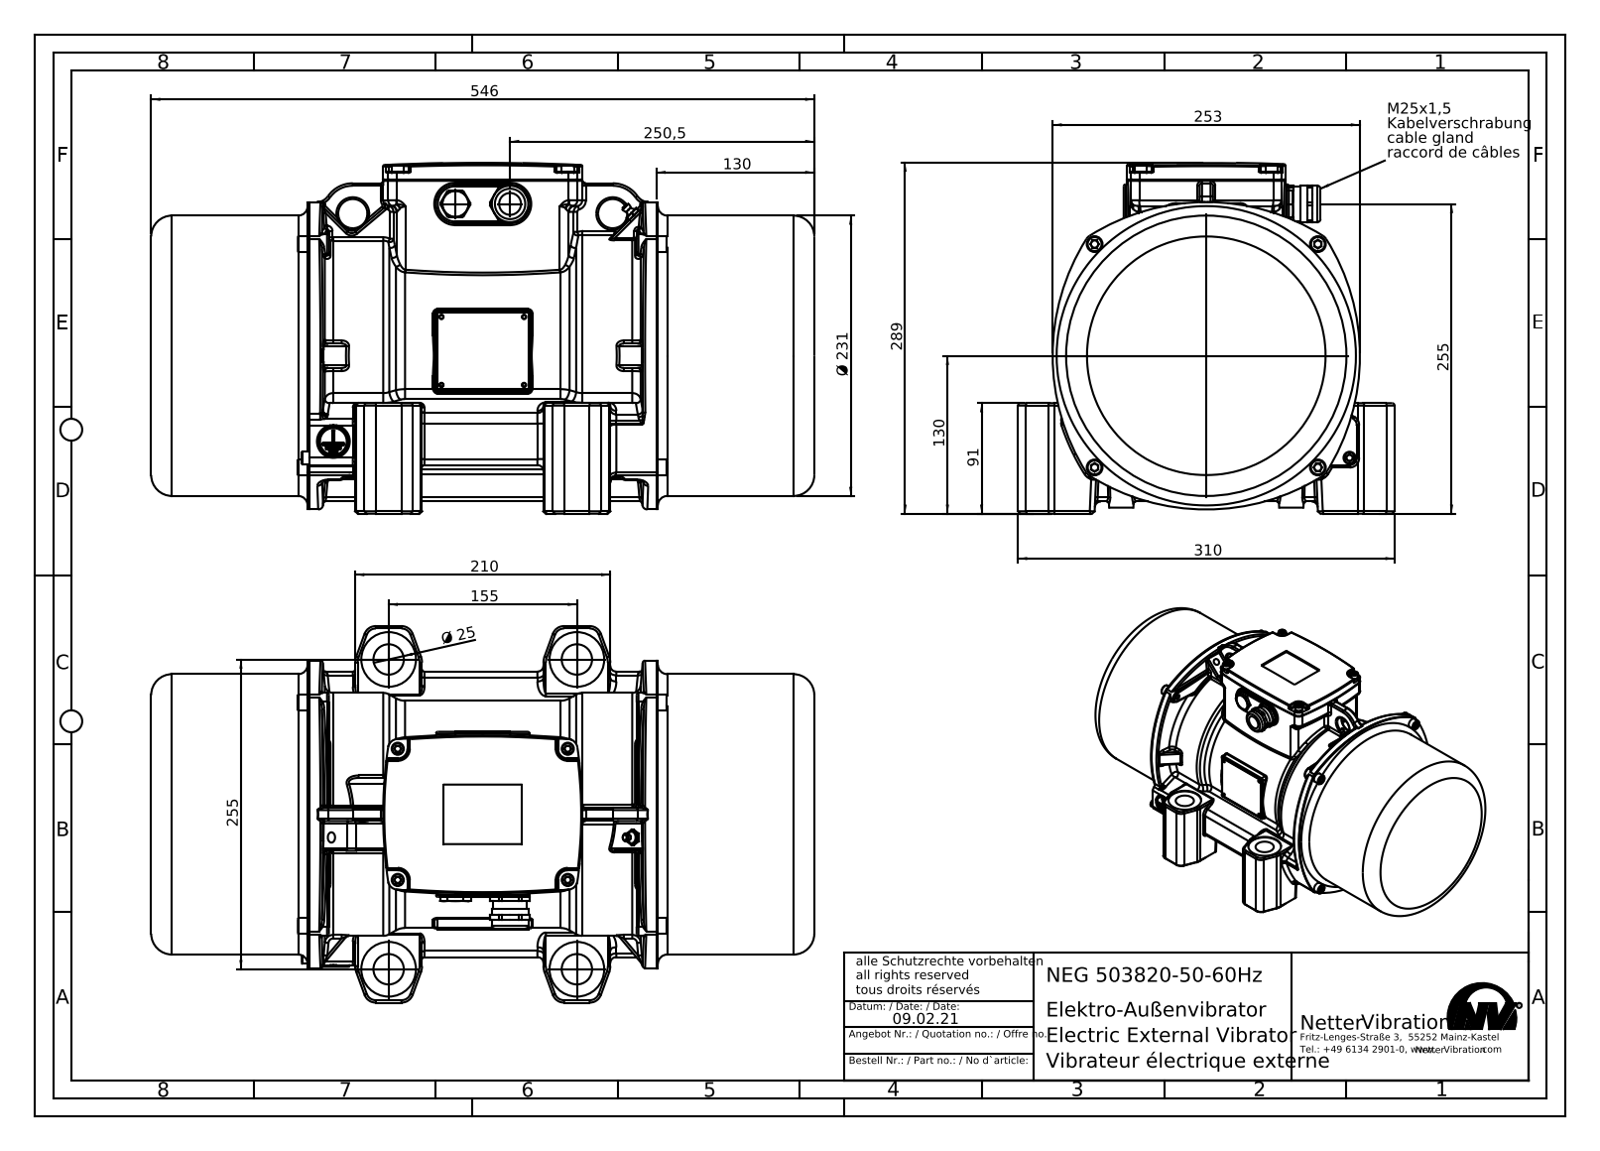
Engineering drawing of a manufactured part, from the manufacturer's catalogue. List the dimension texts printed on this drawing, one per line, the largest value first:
546
310
289
255
255
253
250,5
Ø 231
210
155
130
130
91
Ø 25
